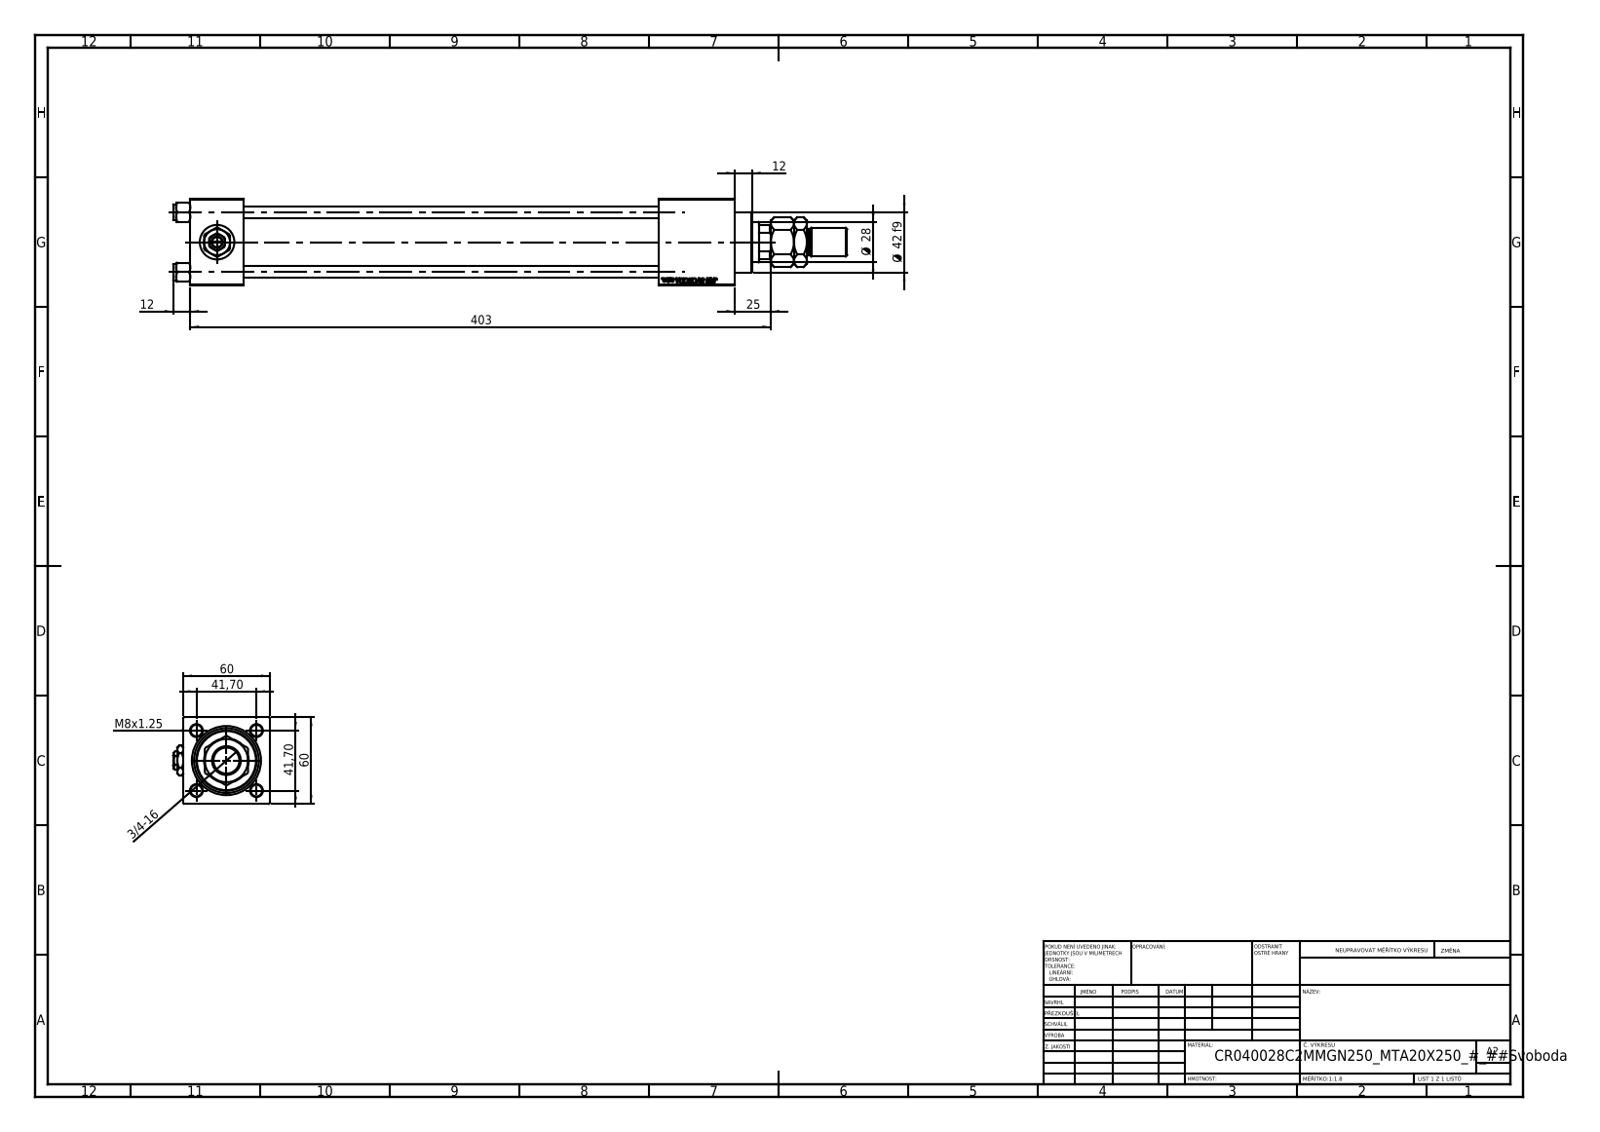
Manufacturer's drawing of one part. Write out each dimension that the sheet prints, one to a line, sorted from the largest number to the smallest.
403
60
60
Ø 42 f9
41,70
41,70
Ø 28
25
12
12
M8x1.25
3/4-16
